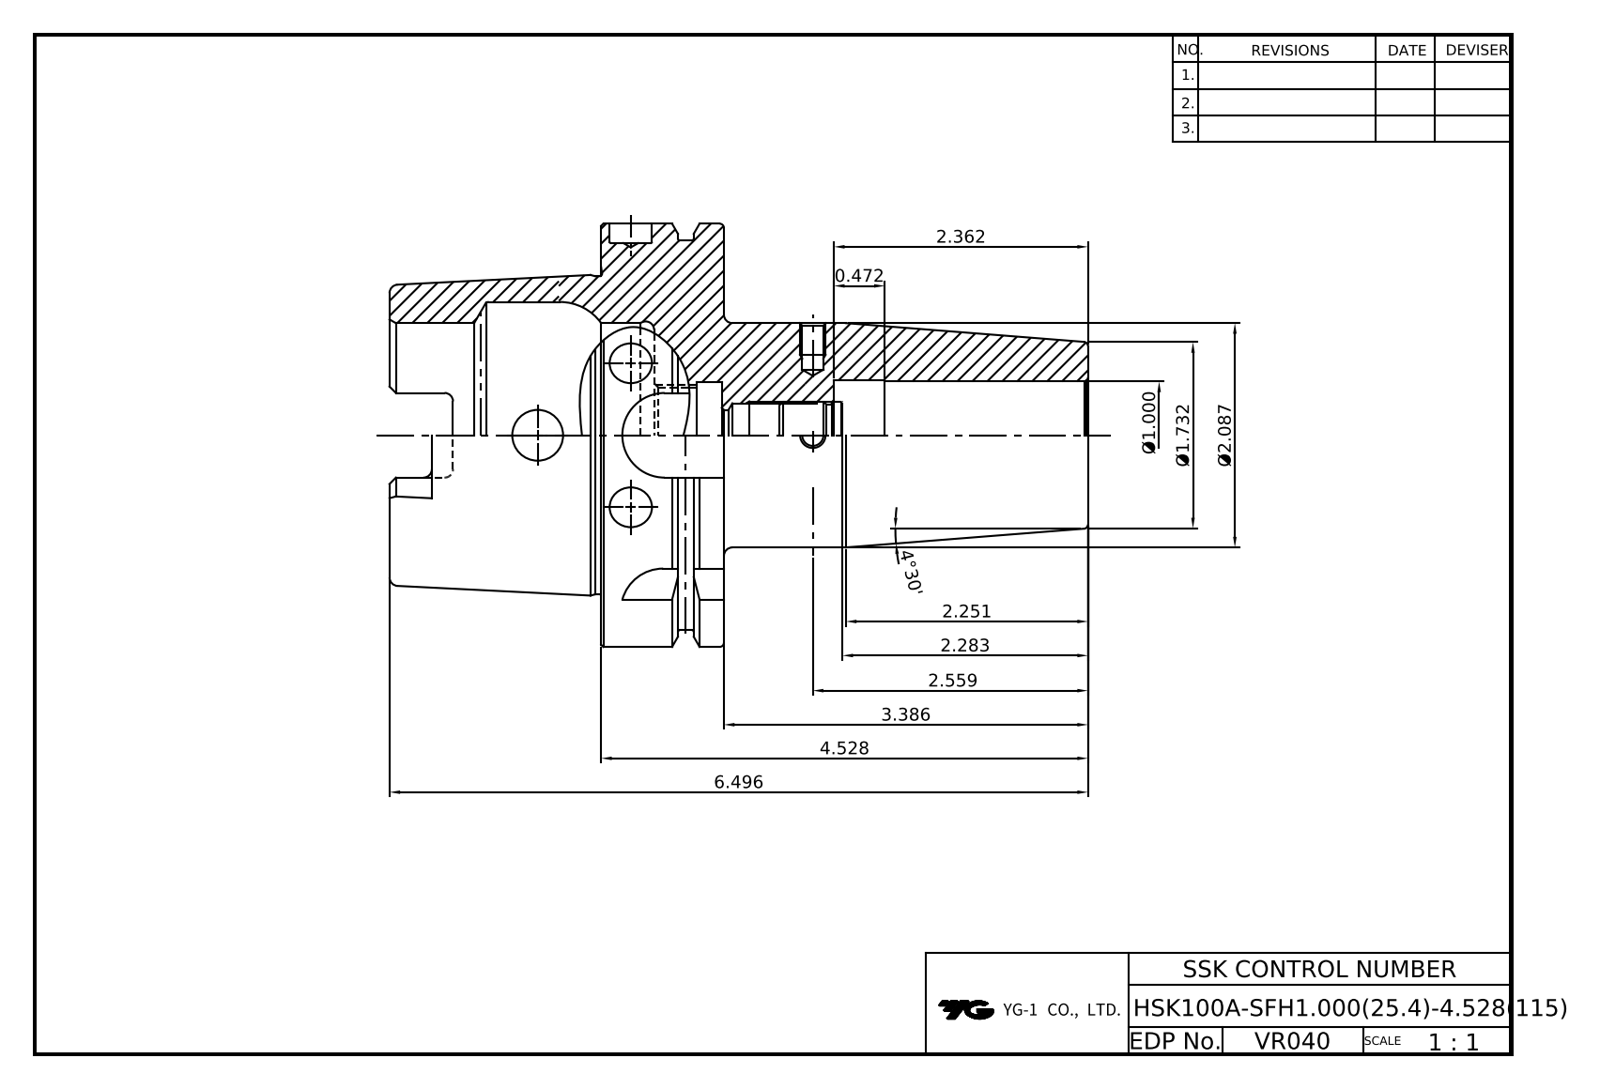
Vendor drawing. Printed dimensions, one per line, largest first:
6.496
4.528
4°30'
3.386
2.559
2.362
2.283
2.251
Ø2.087
Ø1.732
Ø1.000
0.472
